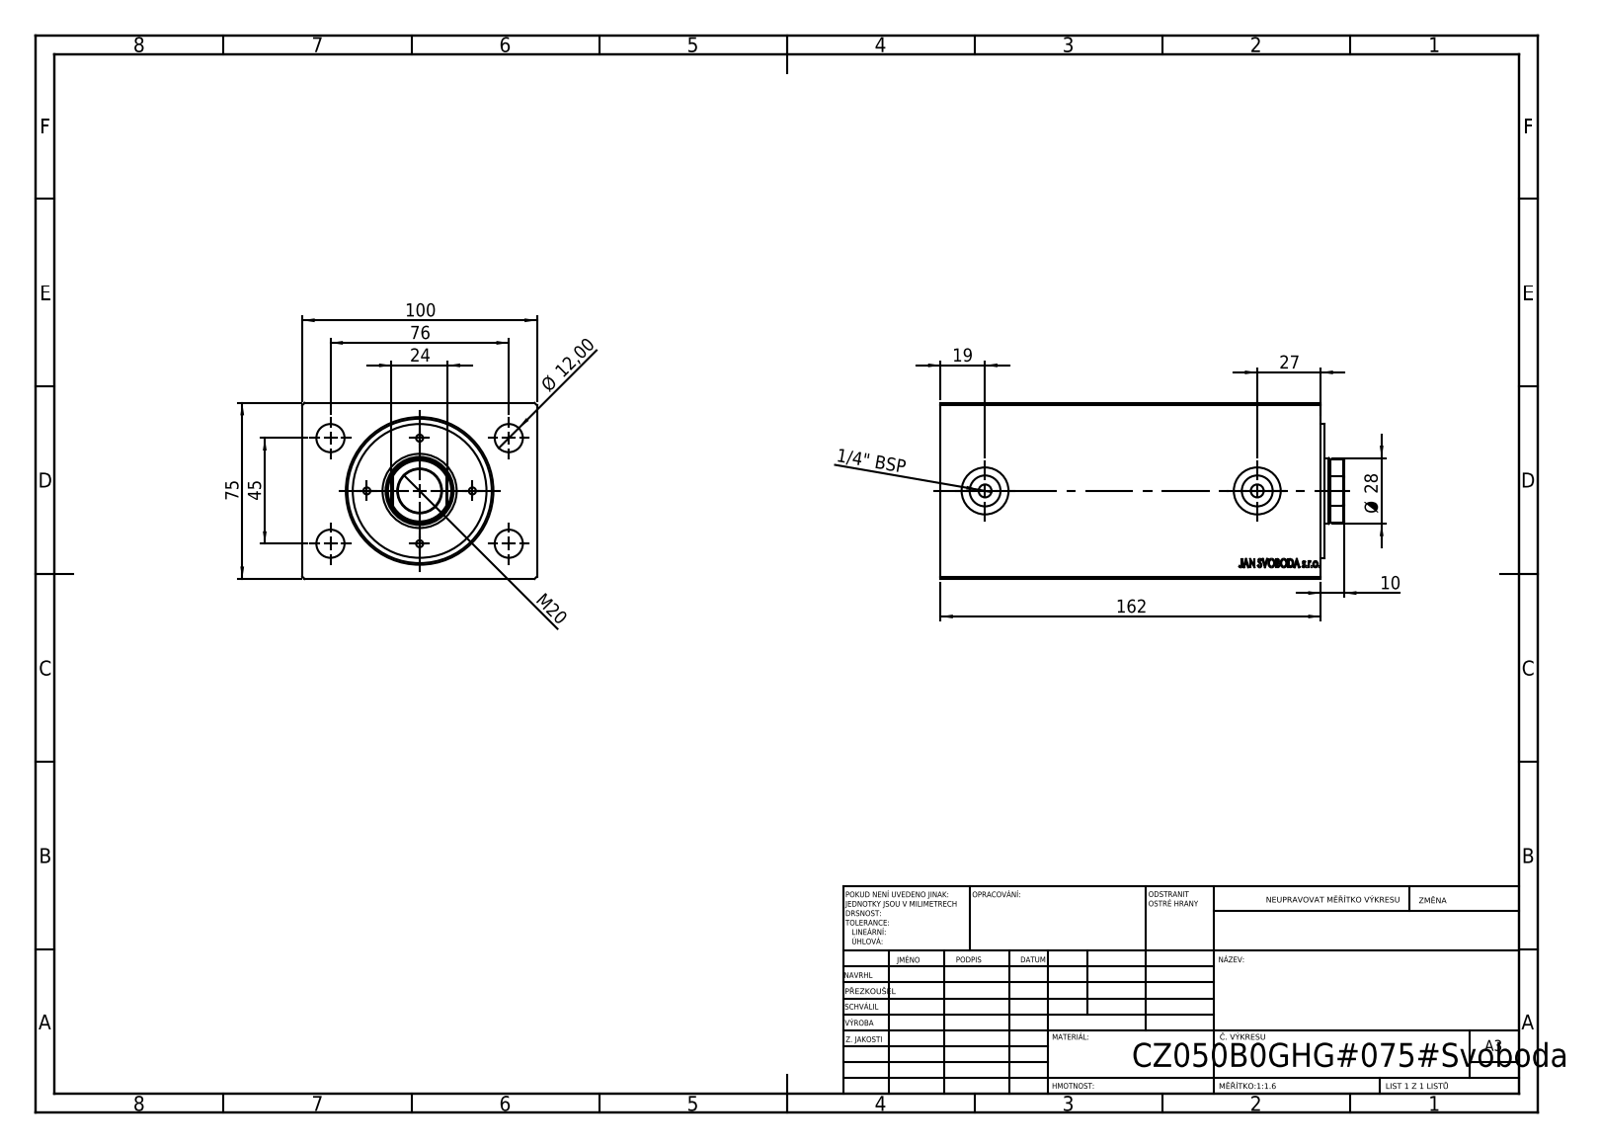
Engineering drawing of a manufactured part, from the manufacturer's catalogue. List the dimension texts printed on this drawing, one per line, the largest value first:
162
100
76
75
45
Ø 28
27
24
M20
19
Ø 12,00
10
1/4" BSP
